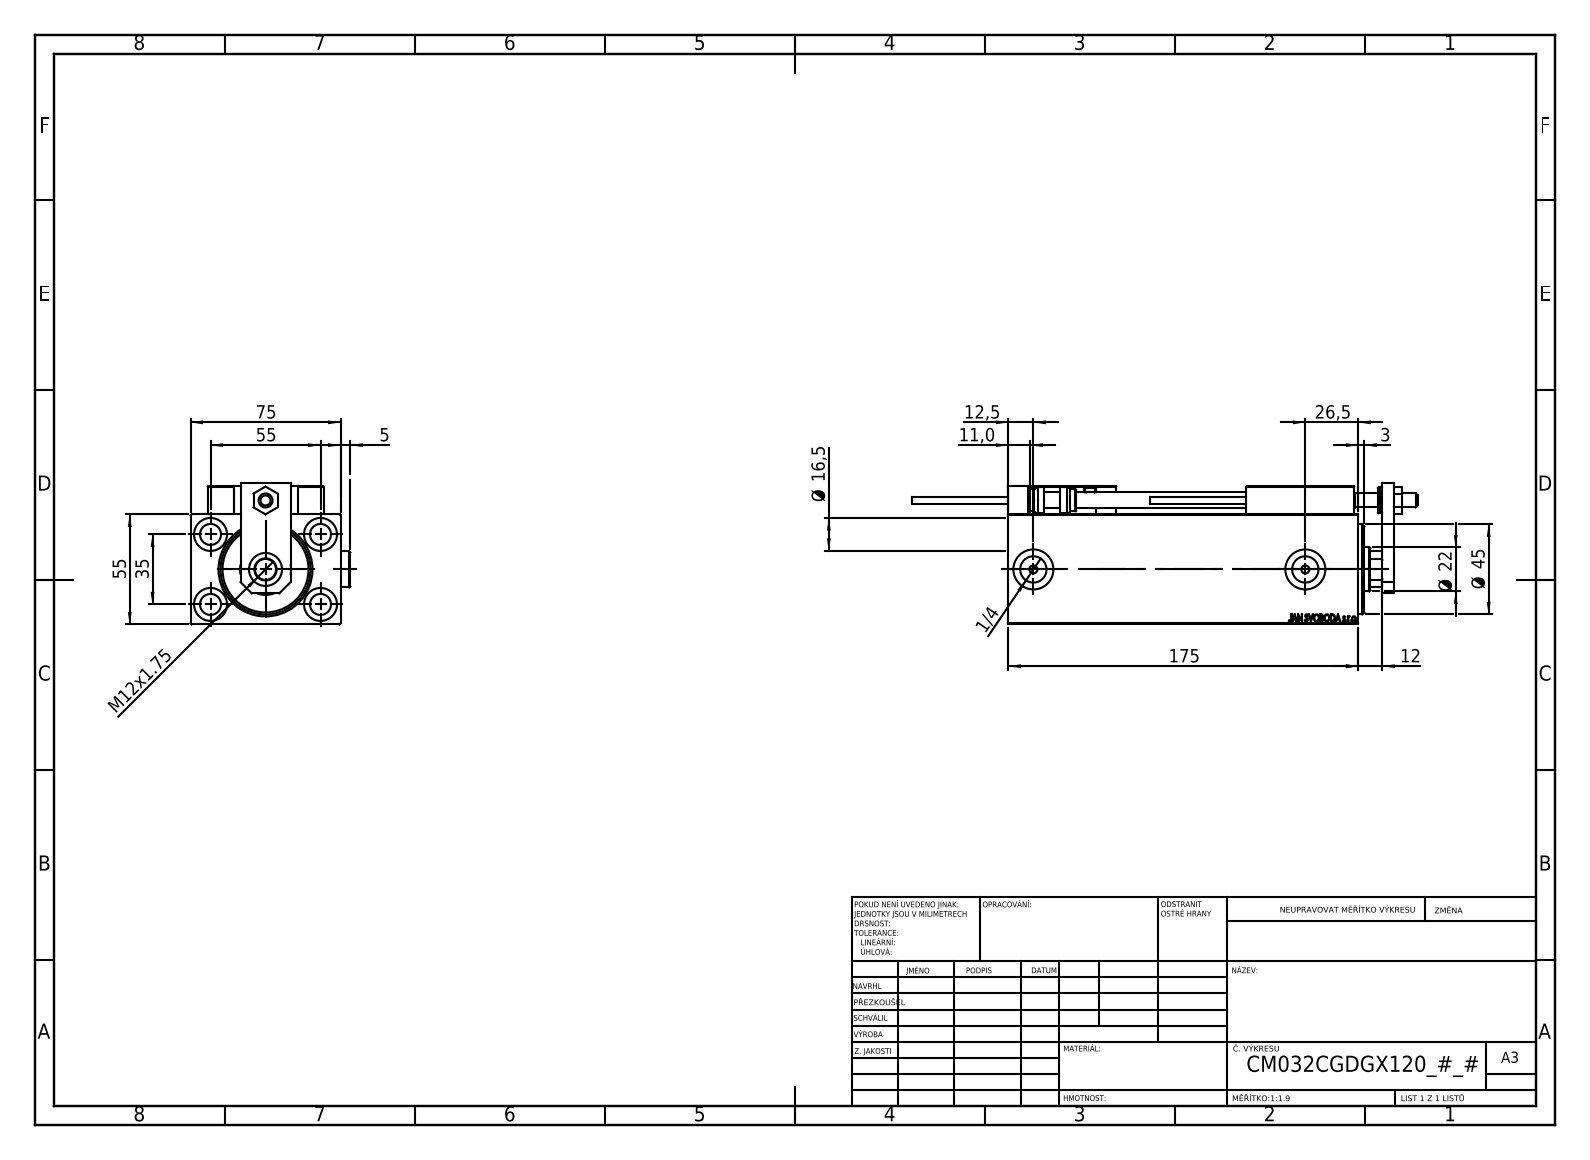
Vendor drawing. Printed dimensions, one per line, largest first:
175
75
55
55
Ø 45
35
26,5
Ø 22
Ø 16,5
12,5
M12x1.75
12
11,0
5
3
1/4
